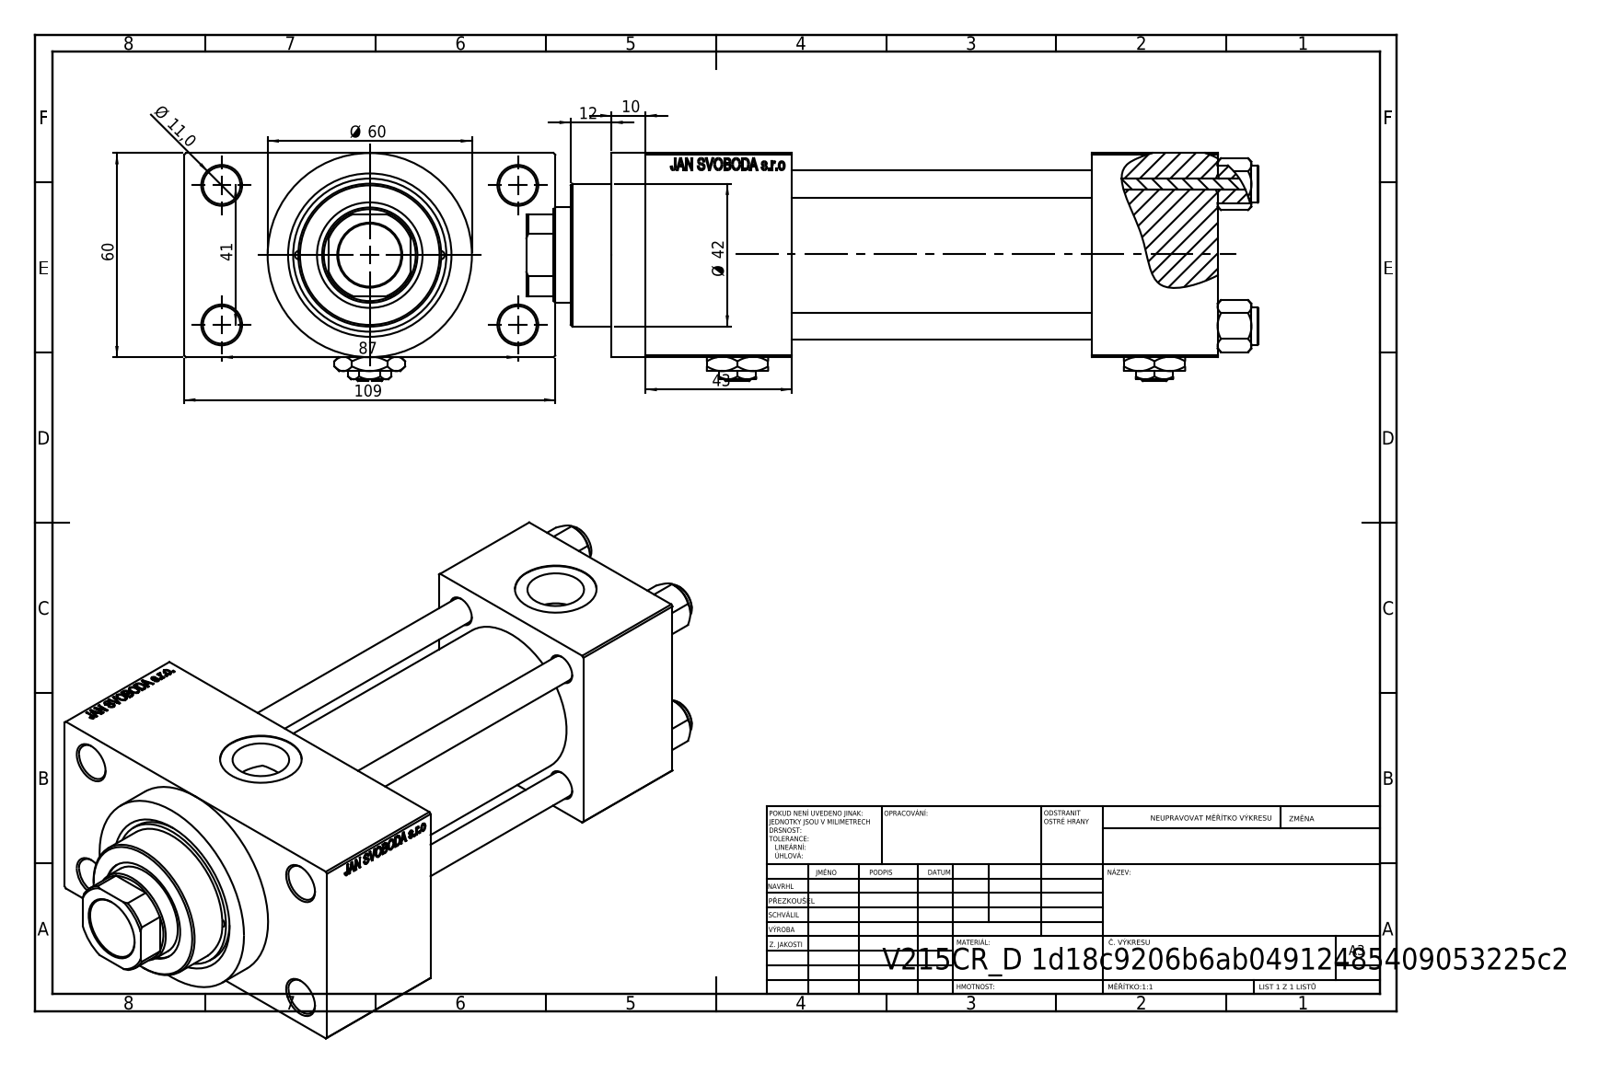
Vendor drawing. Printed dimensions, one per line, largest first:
109
87
60
Ø 60
43
Ø 42
41
12
Ø 11,0
10
